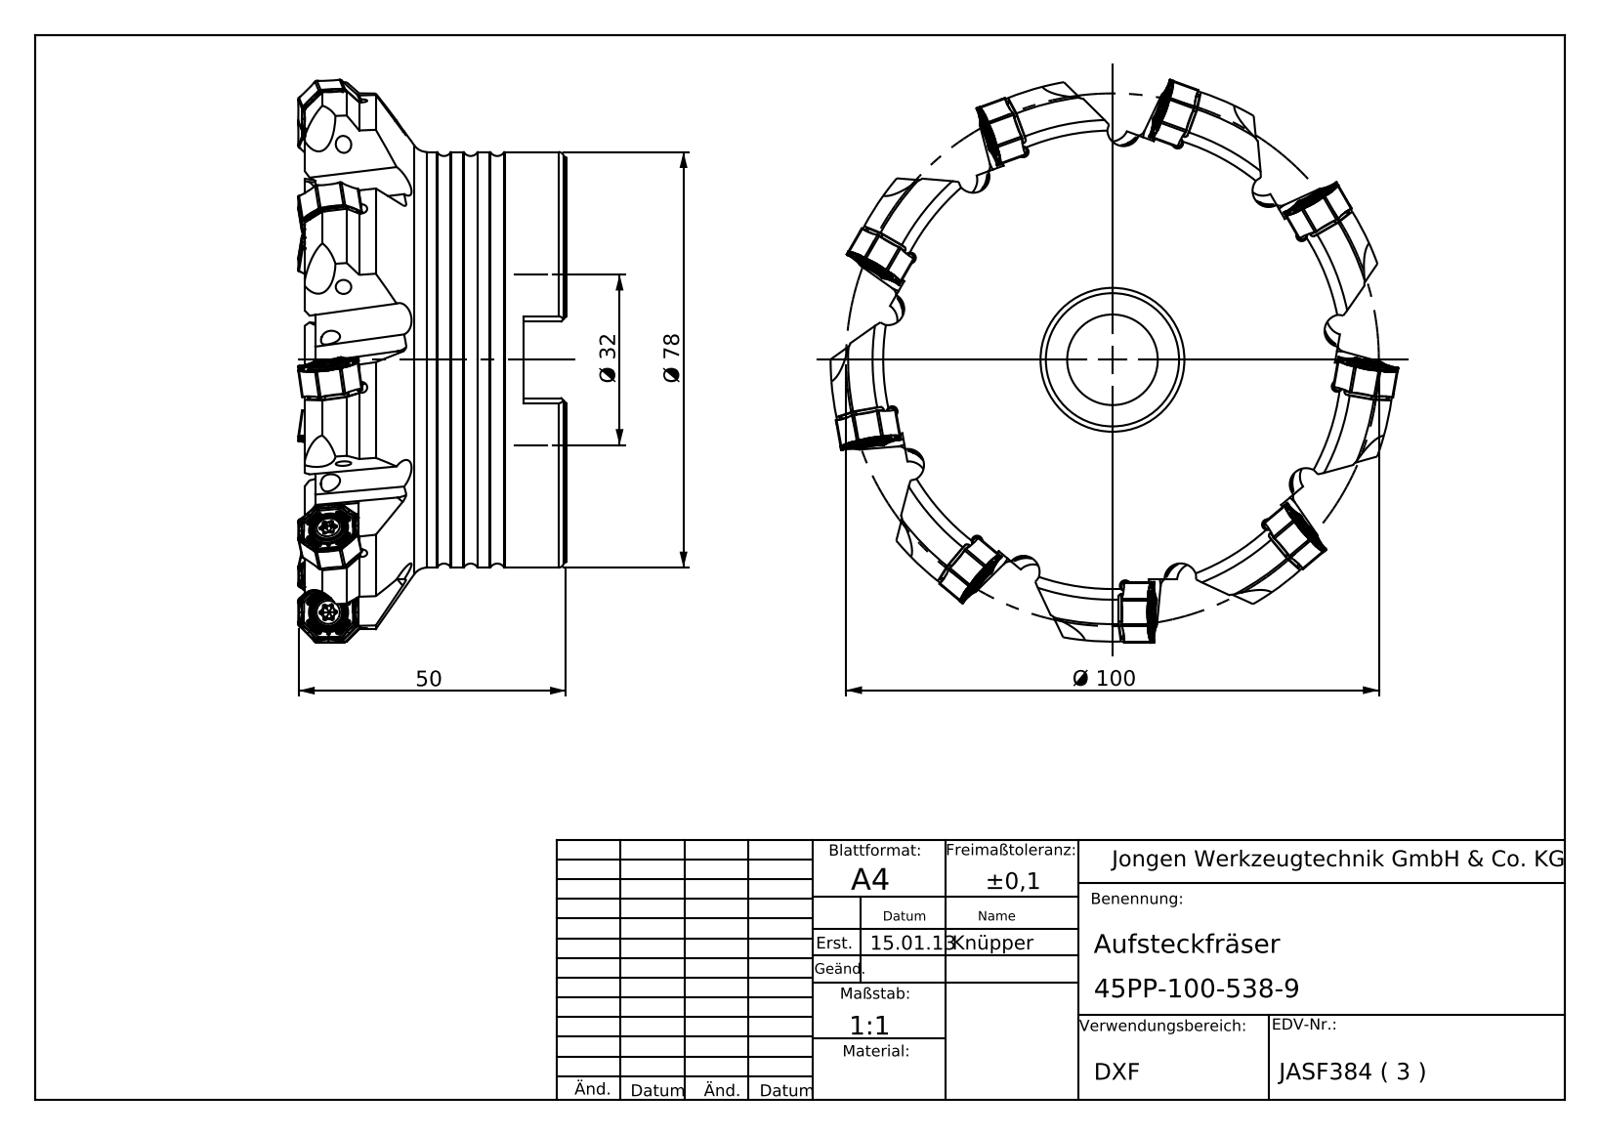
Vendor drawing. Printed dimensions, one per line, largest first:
Ø 100
Ø 78
50
Ø 32
